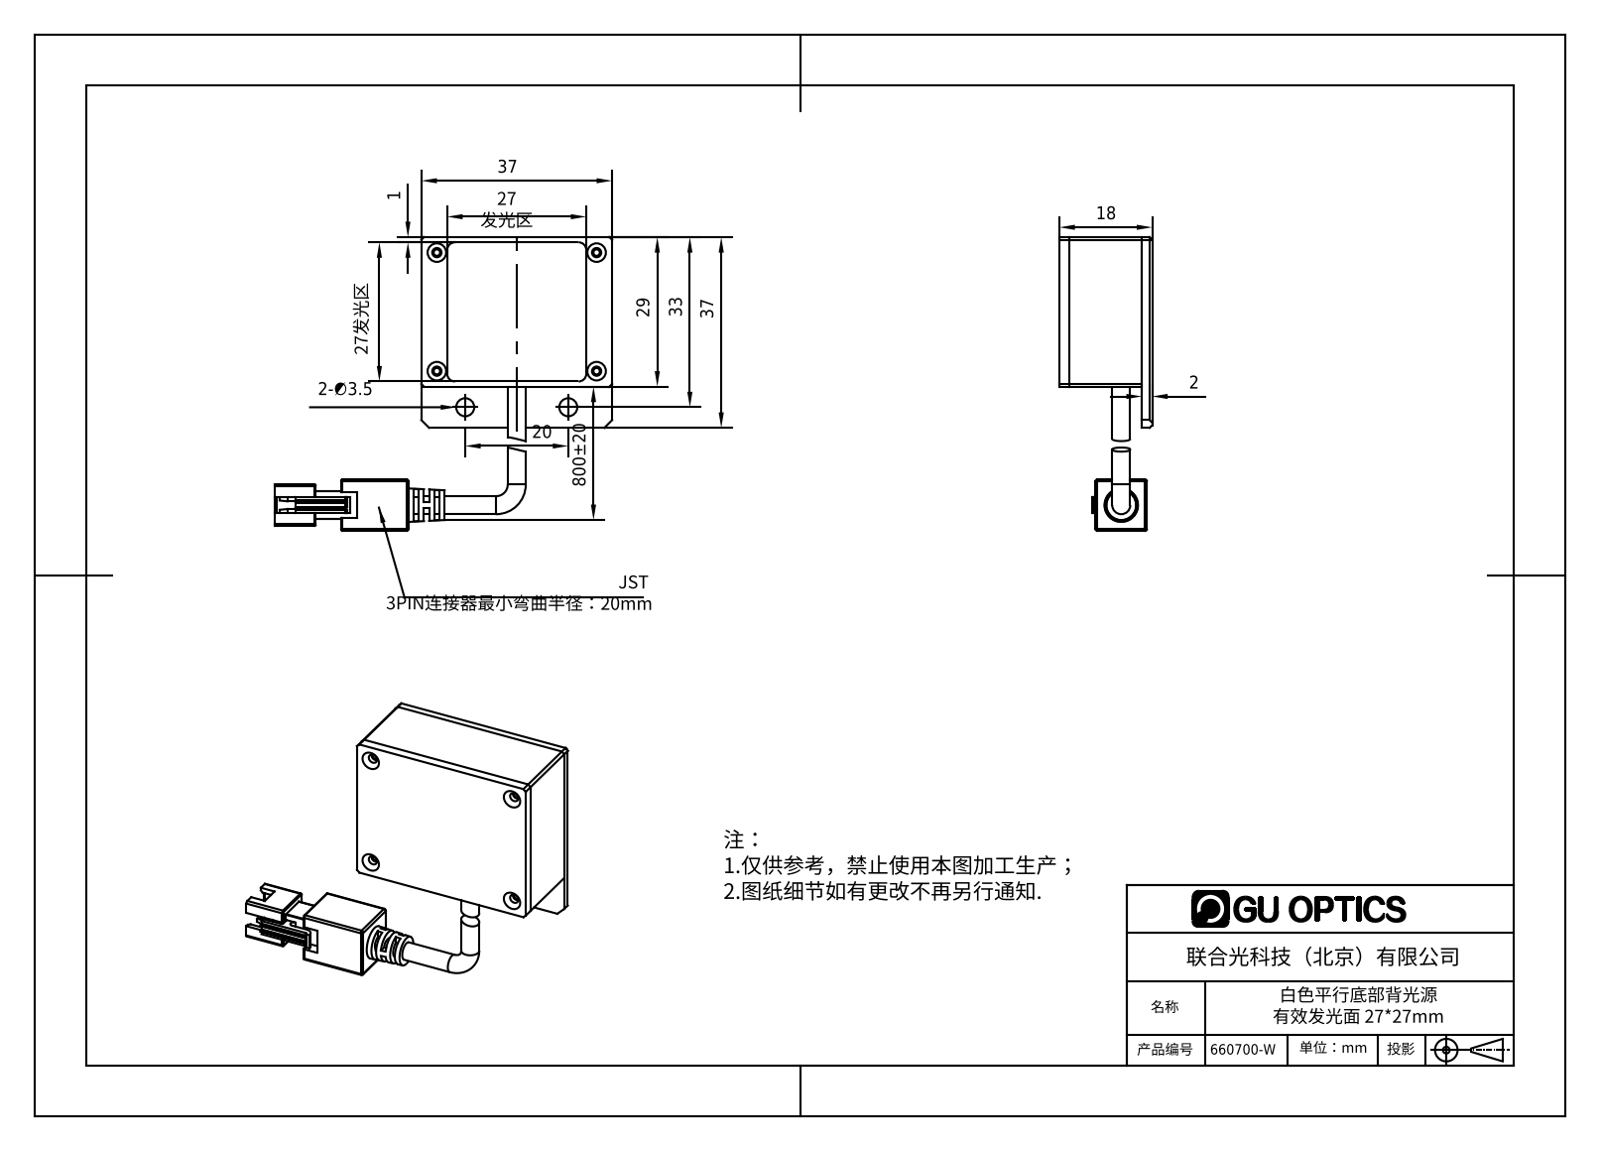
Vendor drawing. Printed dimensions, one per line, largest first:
800±20
37
37
33
29
27 发光区
27发光区
20
18
2-∅3.5
2
1
